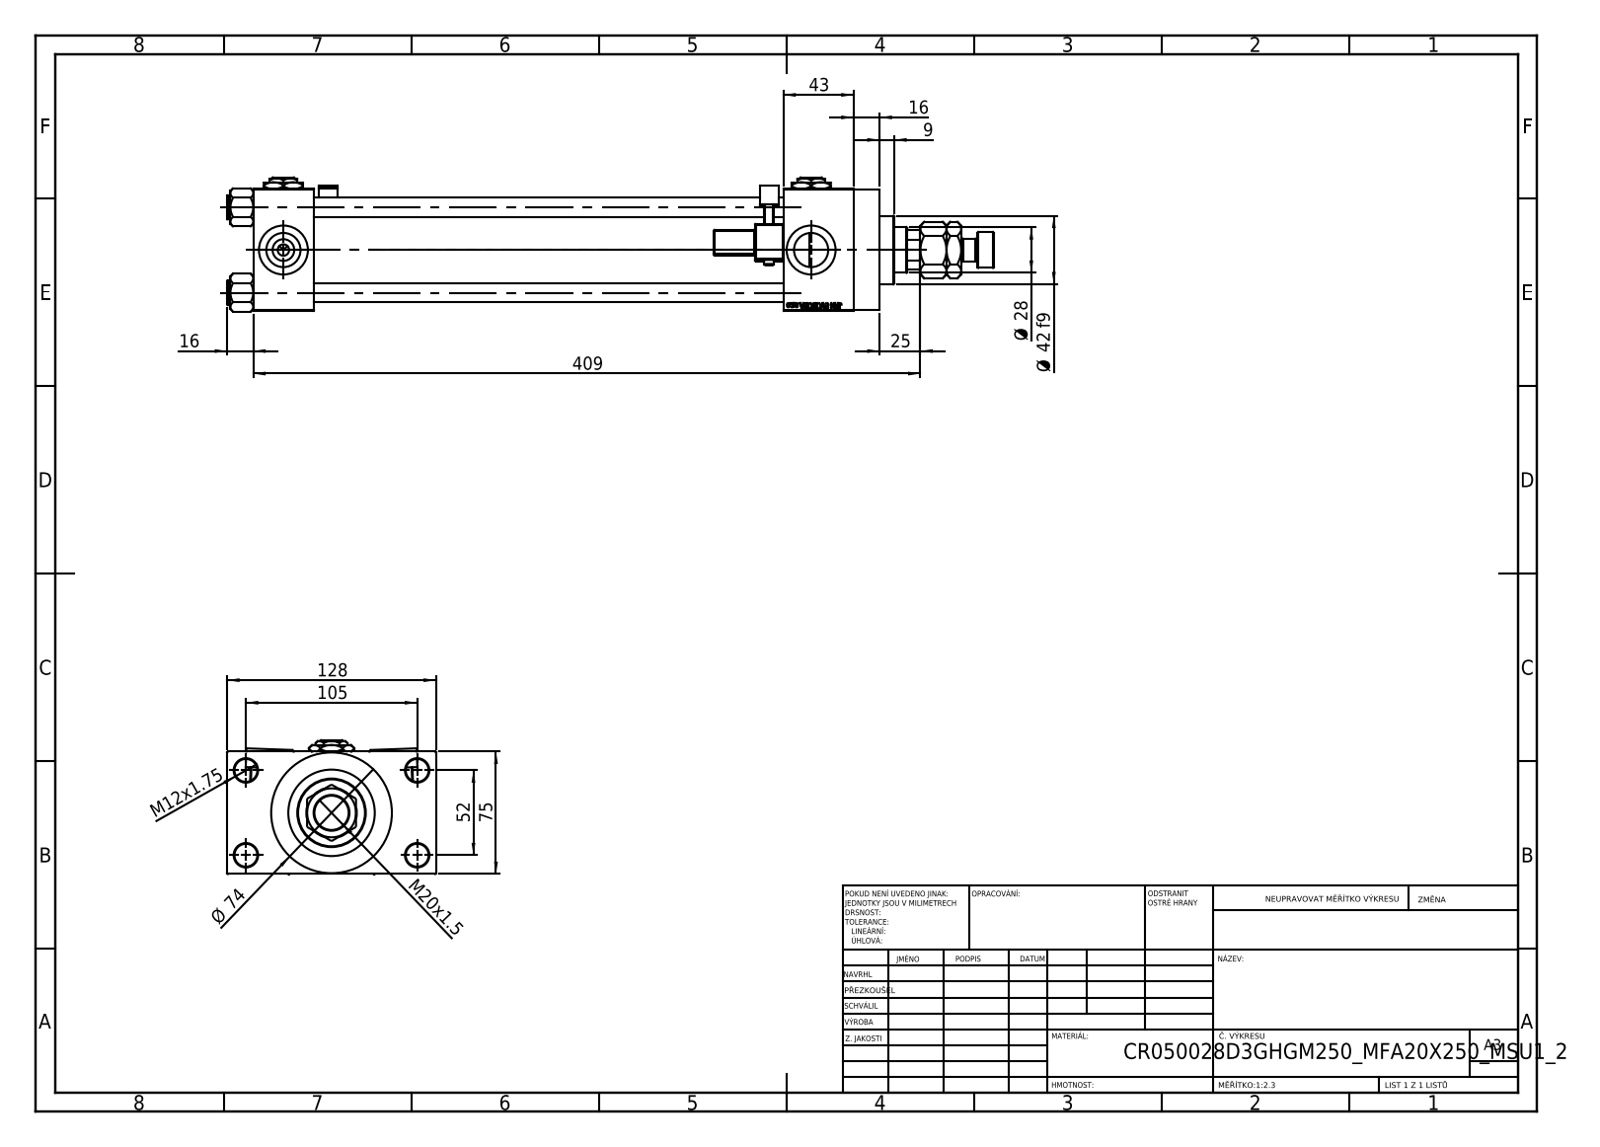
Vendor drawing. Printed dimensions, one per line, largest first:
409
128
105
75
Ø 74
52
43
Ø 42 f9
Ø 28
25
M20x1.5
16
16
M12x1.75
9
